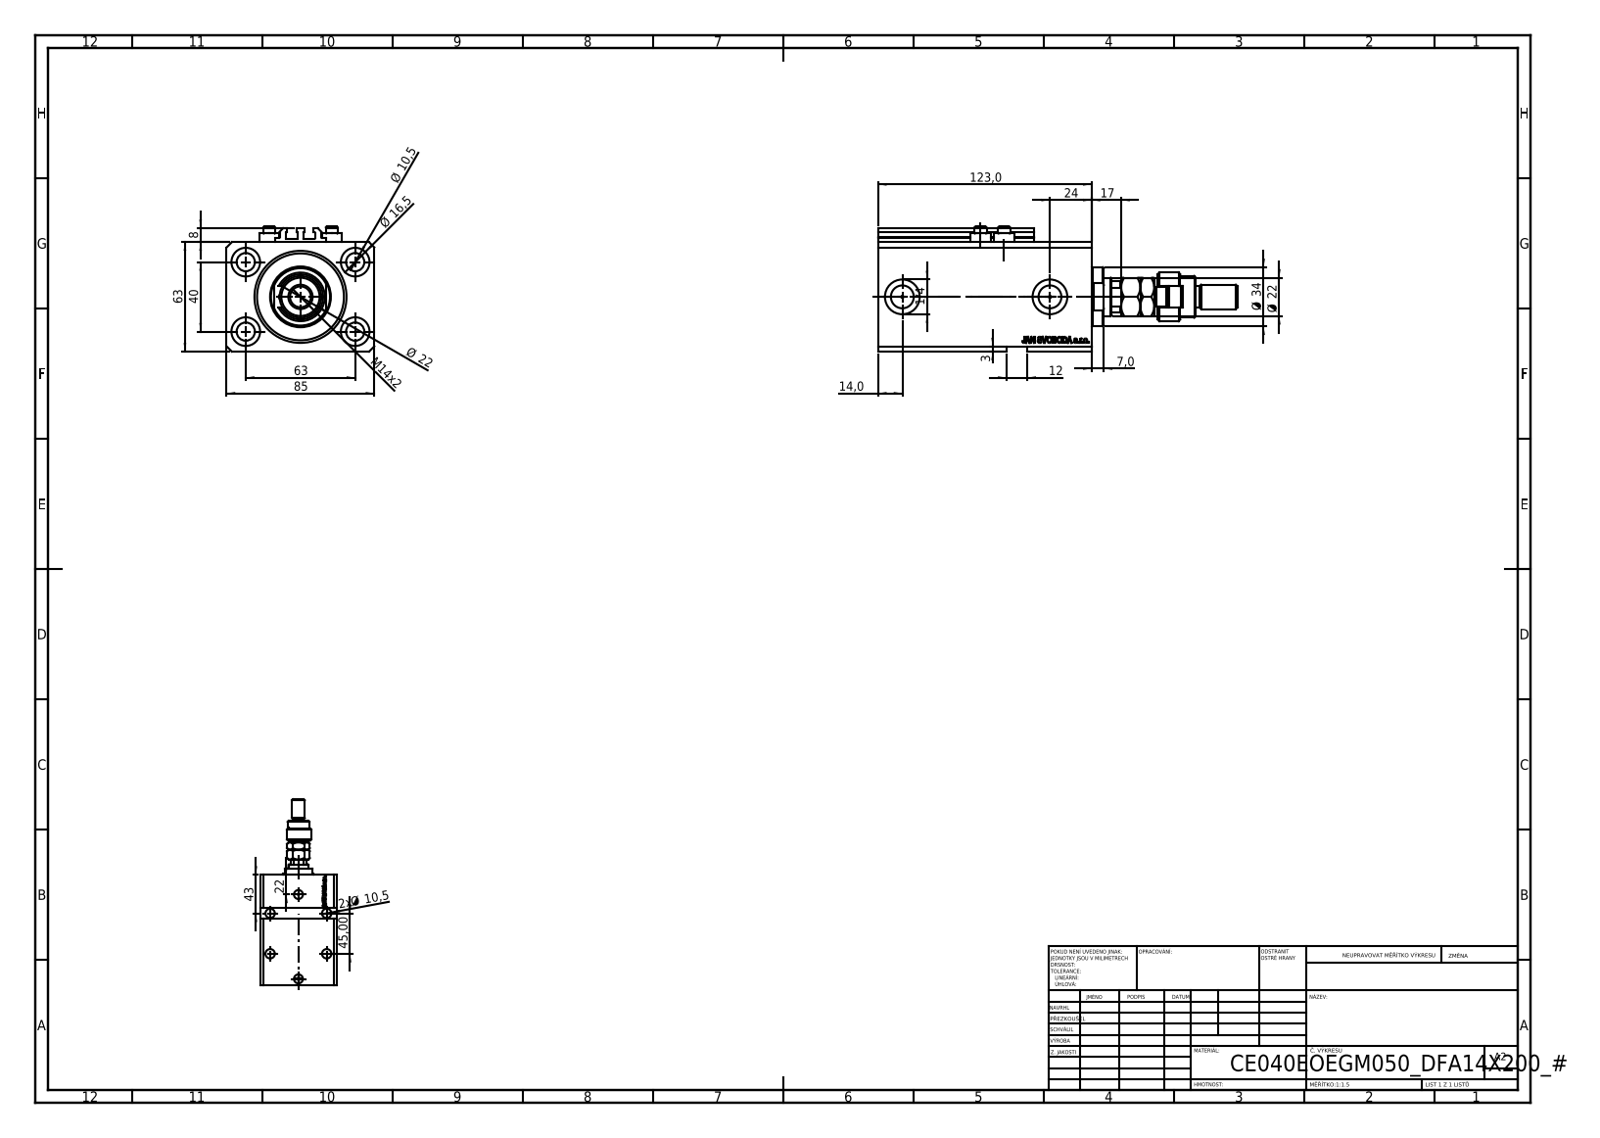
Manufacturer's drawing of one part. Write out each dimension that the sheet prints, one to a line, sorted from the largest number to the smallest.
123,0
85
63
63
45,00
43
40
Ø 34
24
Ø 22
Ø 22
22
17
Ø 16,5
M14x2
14,0
12
Ø 10,5
2x Ø 10,5
8
7,0
3
1/4
